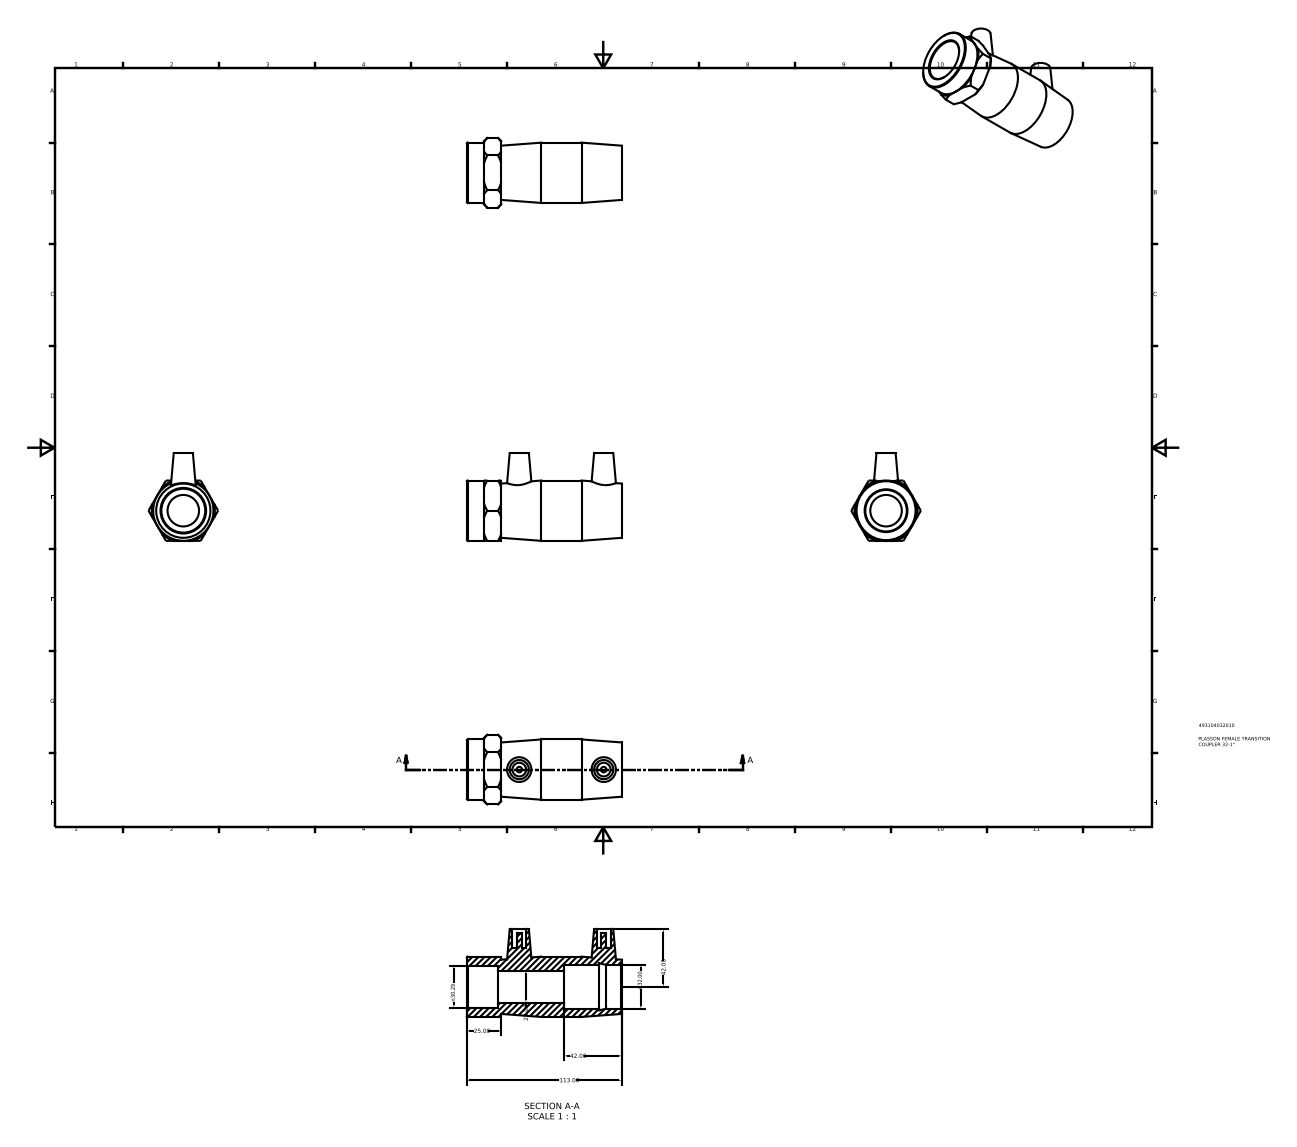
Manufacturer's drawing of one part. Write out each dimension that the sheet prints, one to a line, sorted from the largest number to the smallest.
113.00
42.00
42.00
n32.00
n30.29
25.00
23.00
